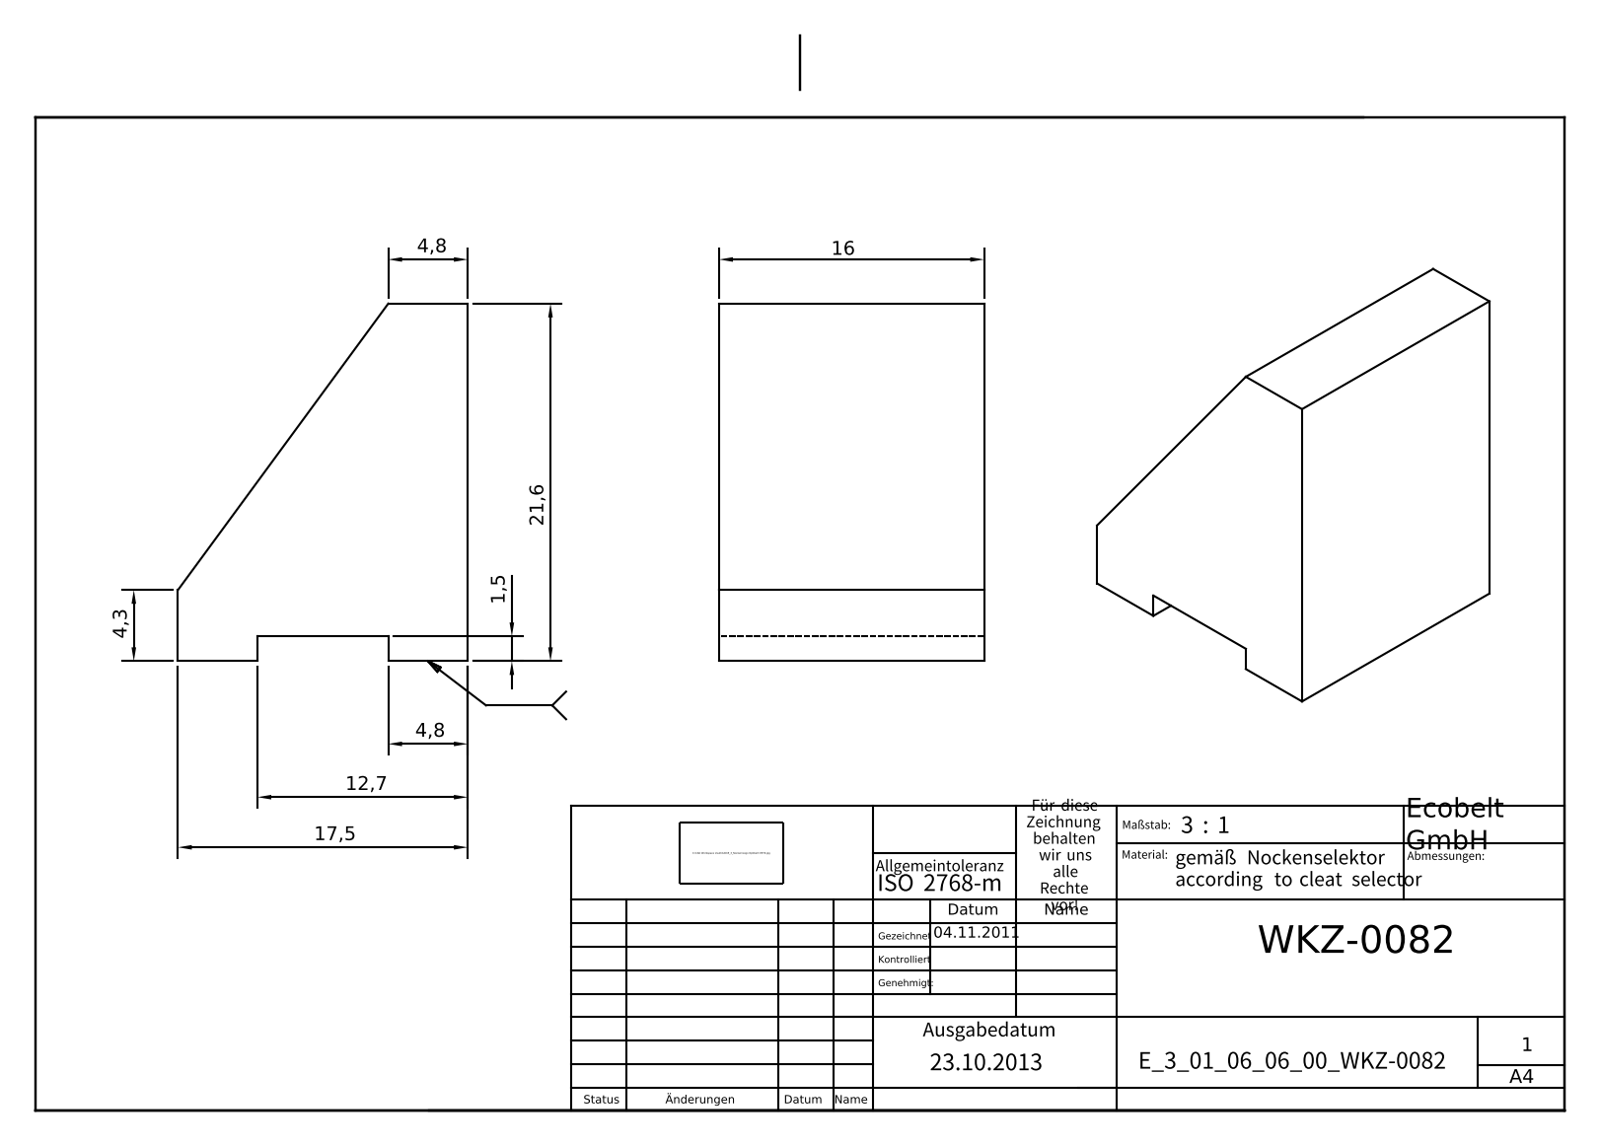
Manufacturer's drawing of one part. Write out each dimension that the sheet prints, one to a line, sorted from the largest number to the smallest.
21,6
17,5
16
12,7
4,8
4,8
4,3
1,5
